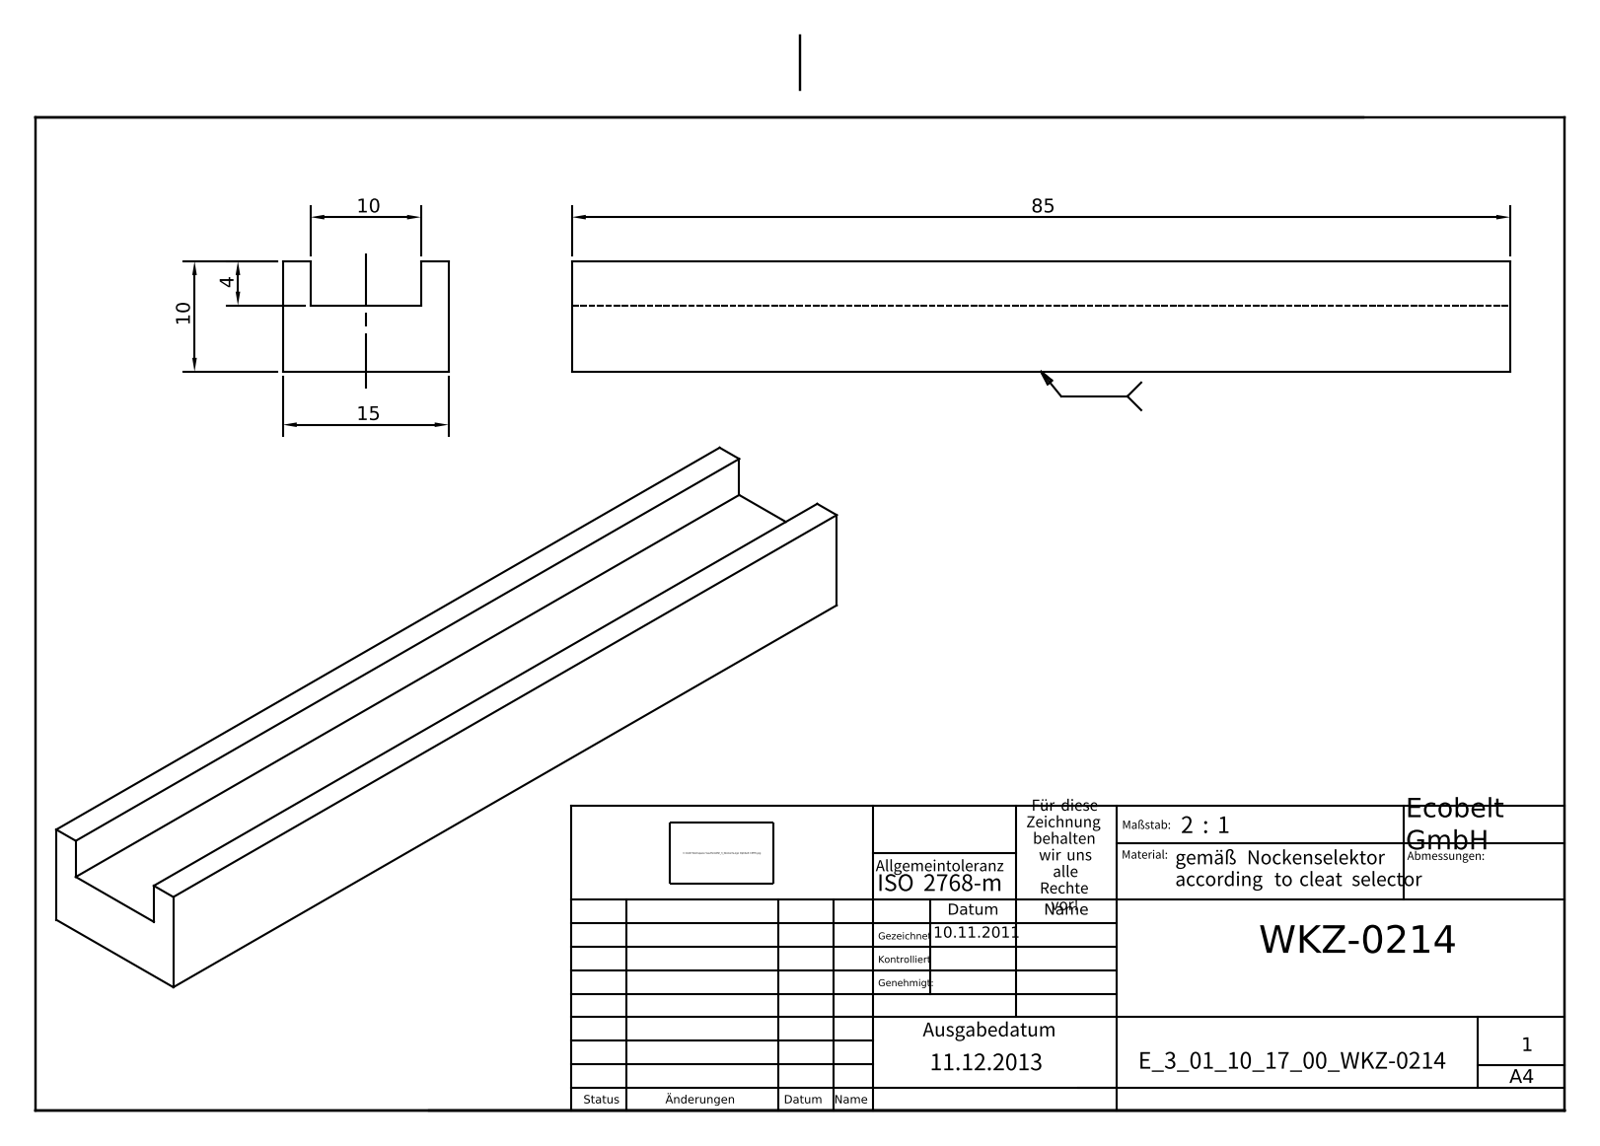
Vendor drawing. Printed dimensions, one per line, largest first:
85
15
10
10
4
